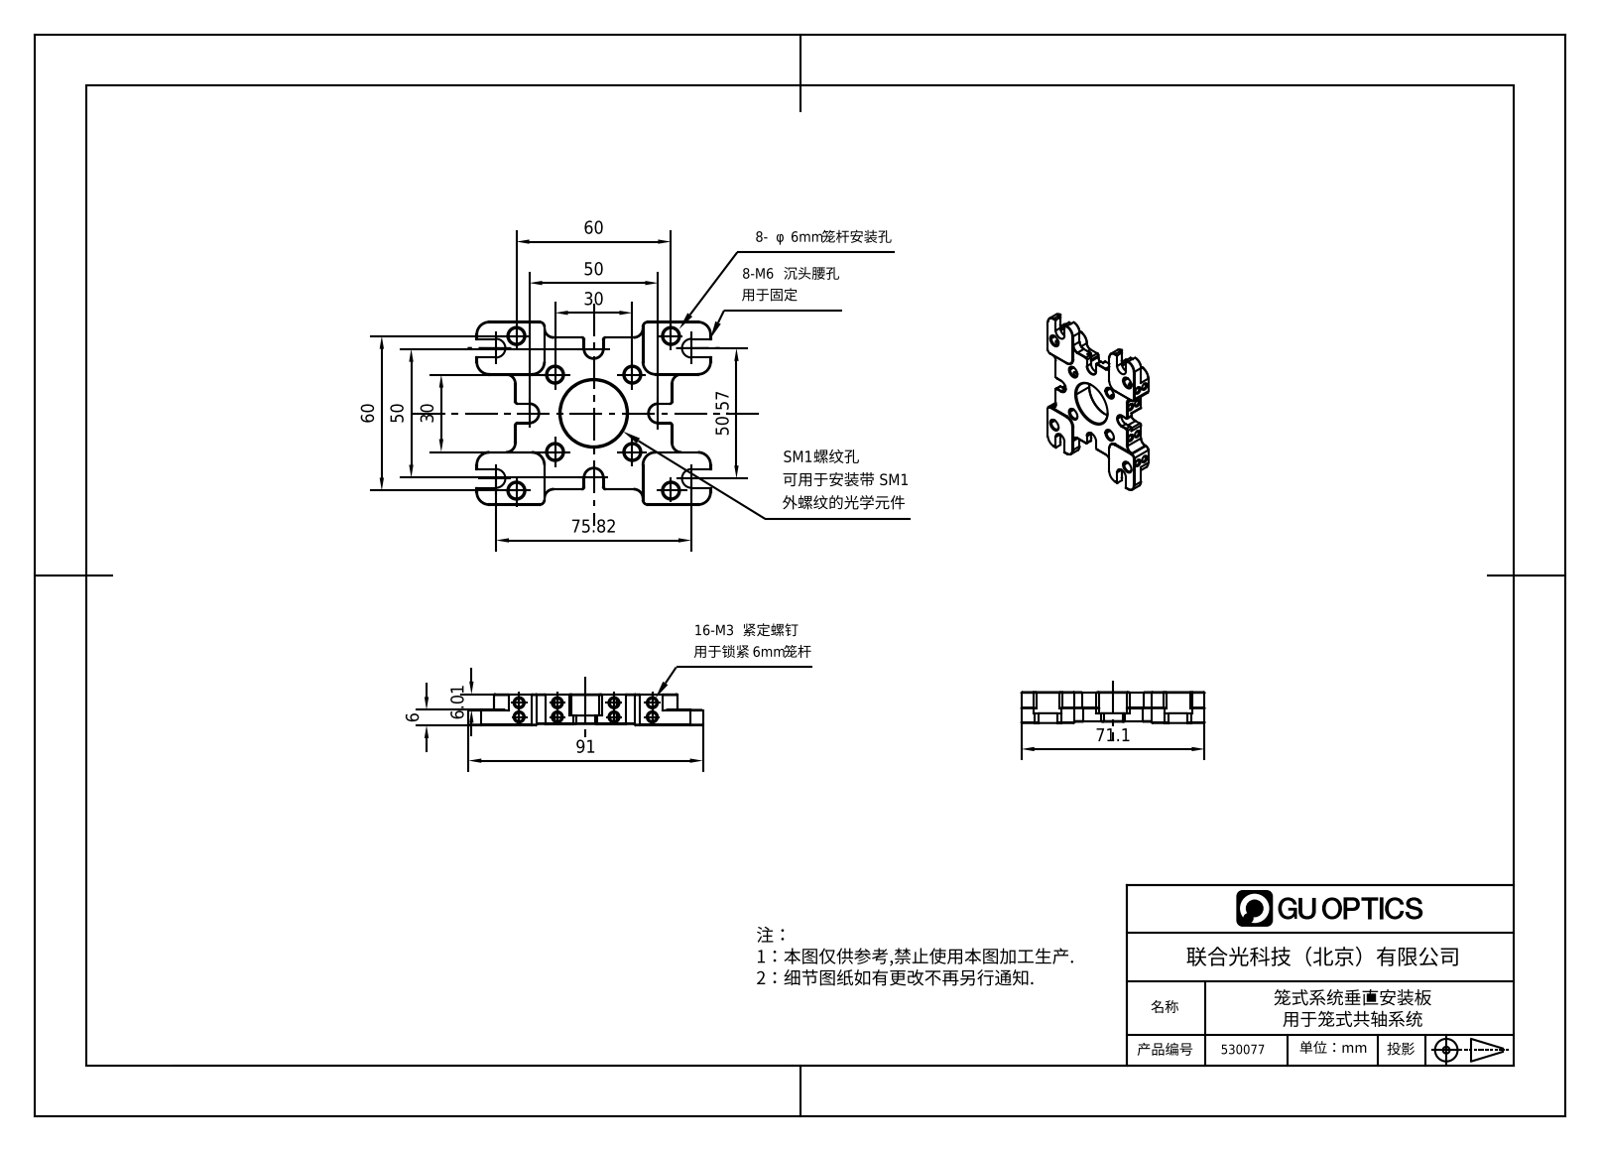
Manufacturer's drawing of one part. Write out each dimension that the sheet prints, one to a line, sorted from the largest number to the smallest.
91
75.82
71.1
60
60
50.57
50
50
30
30
6.01
6
